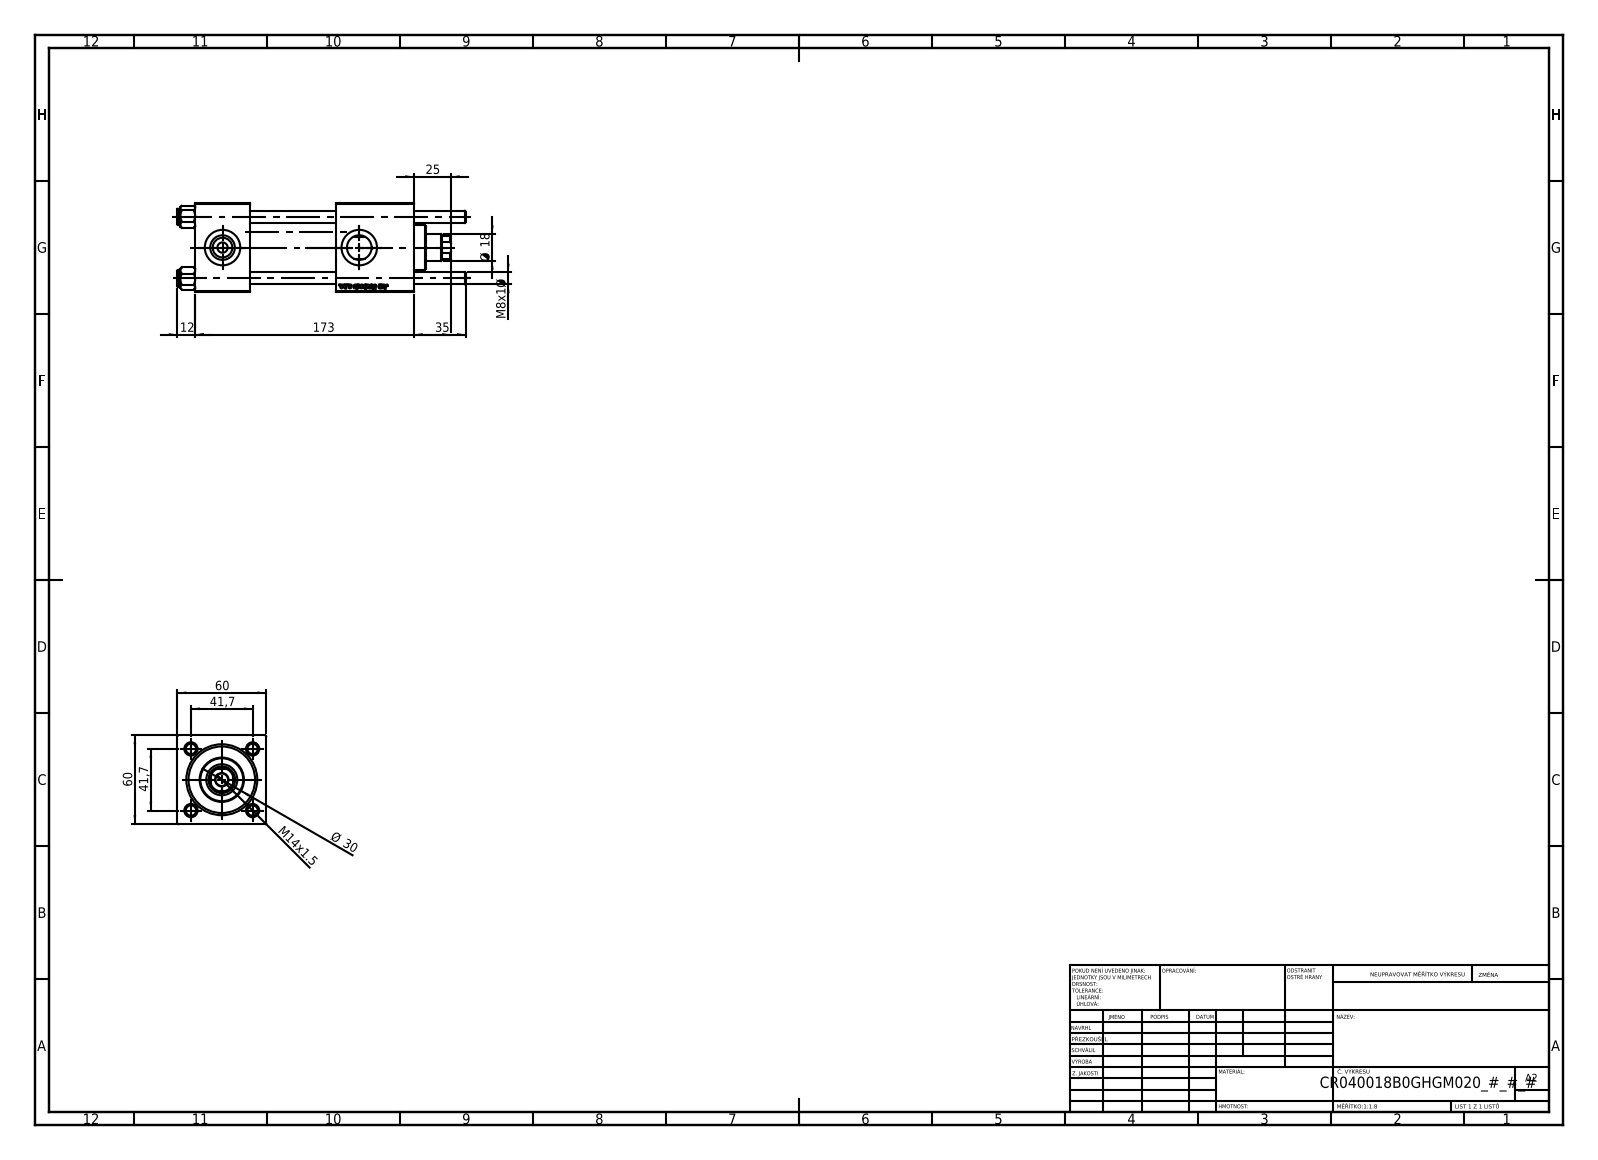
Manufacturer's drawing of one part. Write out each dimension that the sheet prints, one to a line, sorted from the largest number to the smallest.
173
60
60
41,7
41,7
35
Ø 30
25
Ø 18
M14x1.5
12
M8x1 Ø
